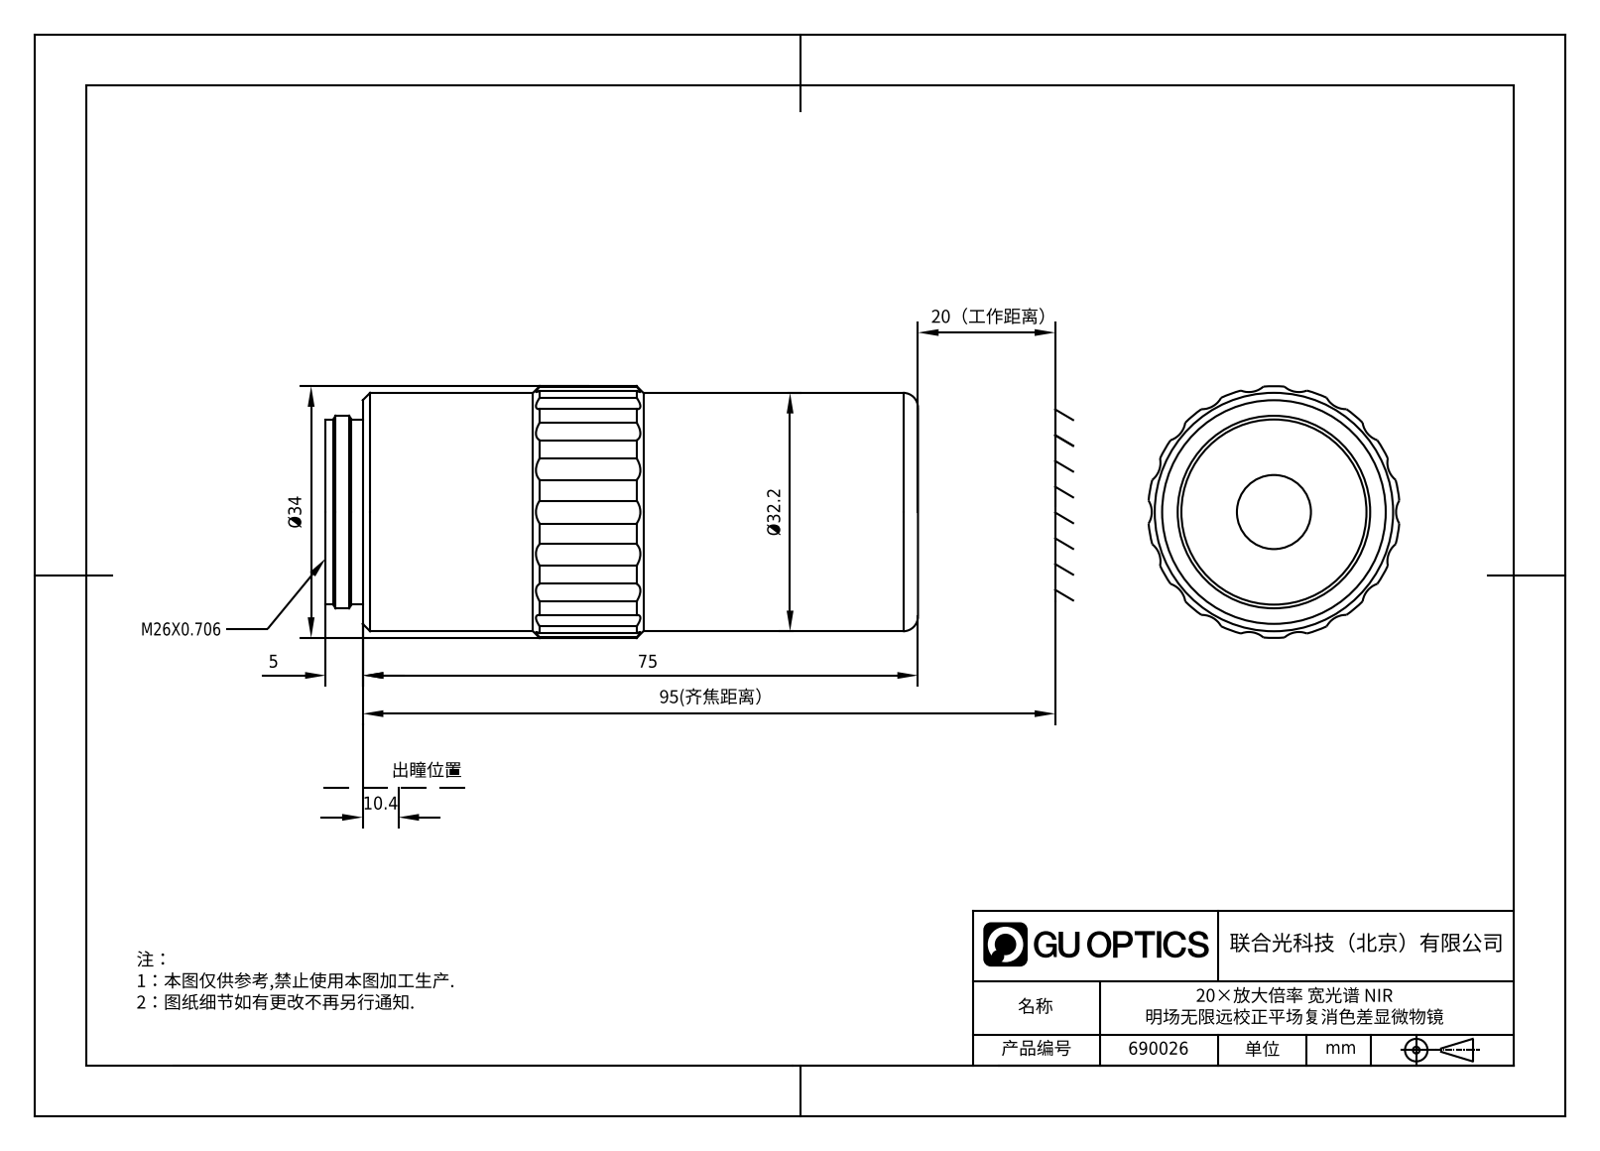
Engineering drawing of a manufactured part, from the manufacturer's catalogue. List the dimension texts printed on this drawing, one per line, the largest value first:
95(齐焦距离）
75
Ø34
Ø32.2
20（工作距离）
10.4
5
